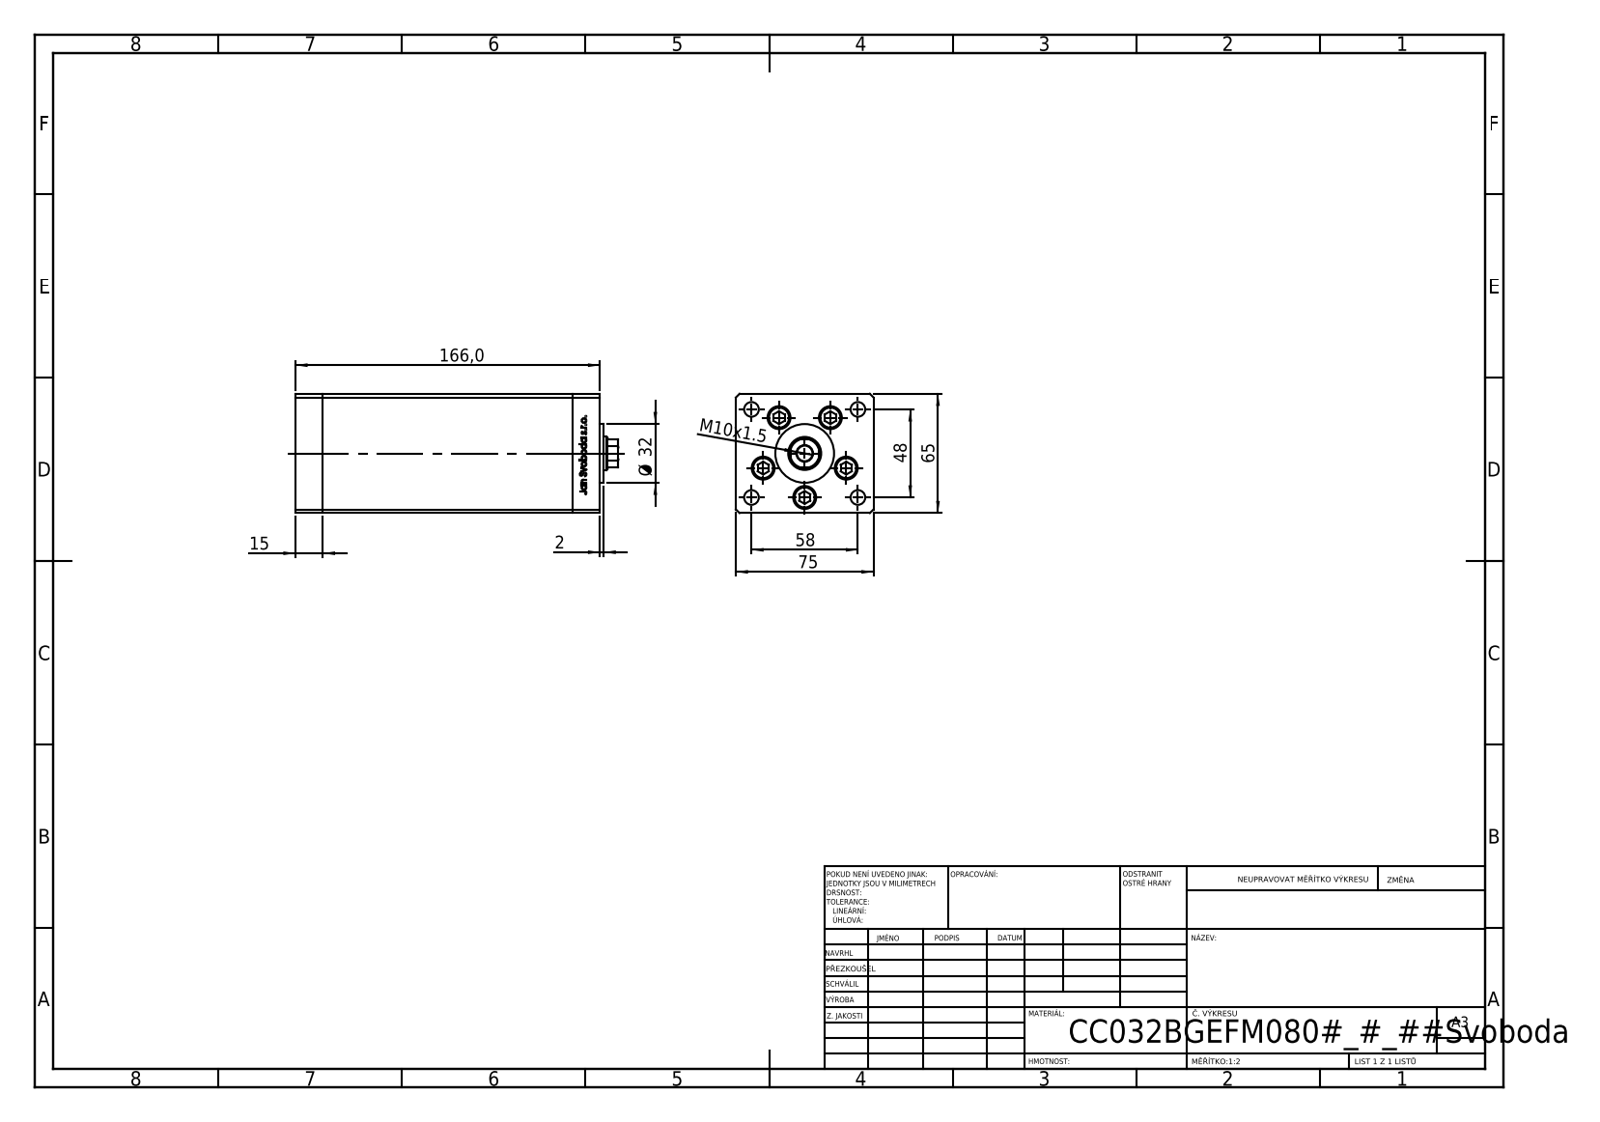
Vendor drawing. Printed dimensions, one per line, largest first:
166,0
75
65
58
48
Ø 32
15
M10x1.5
2
